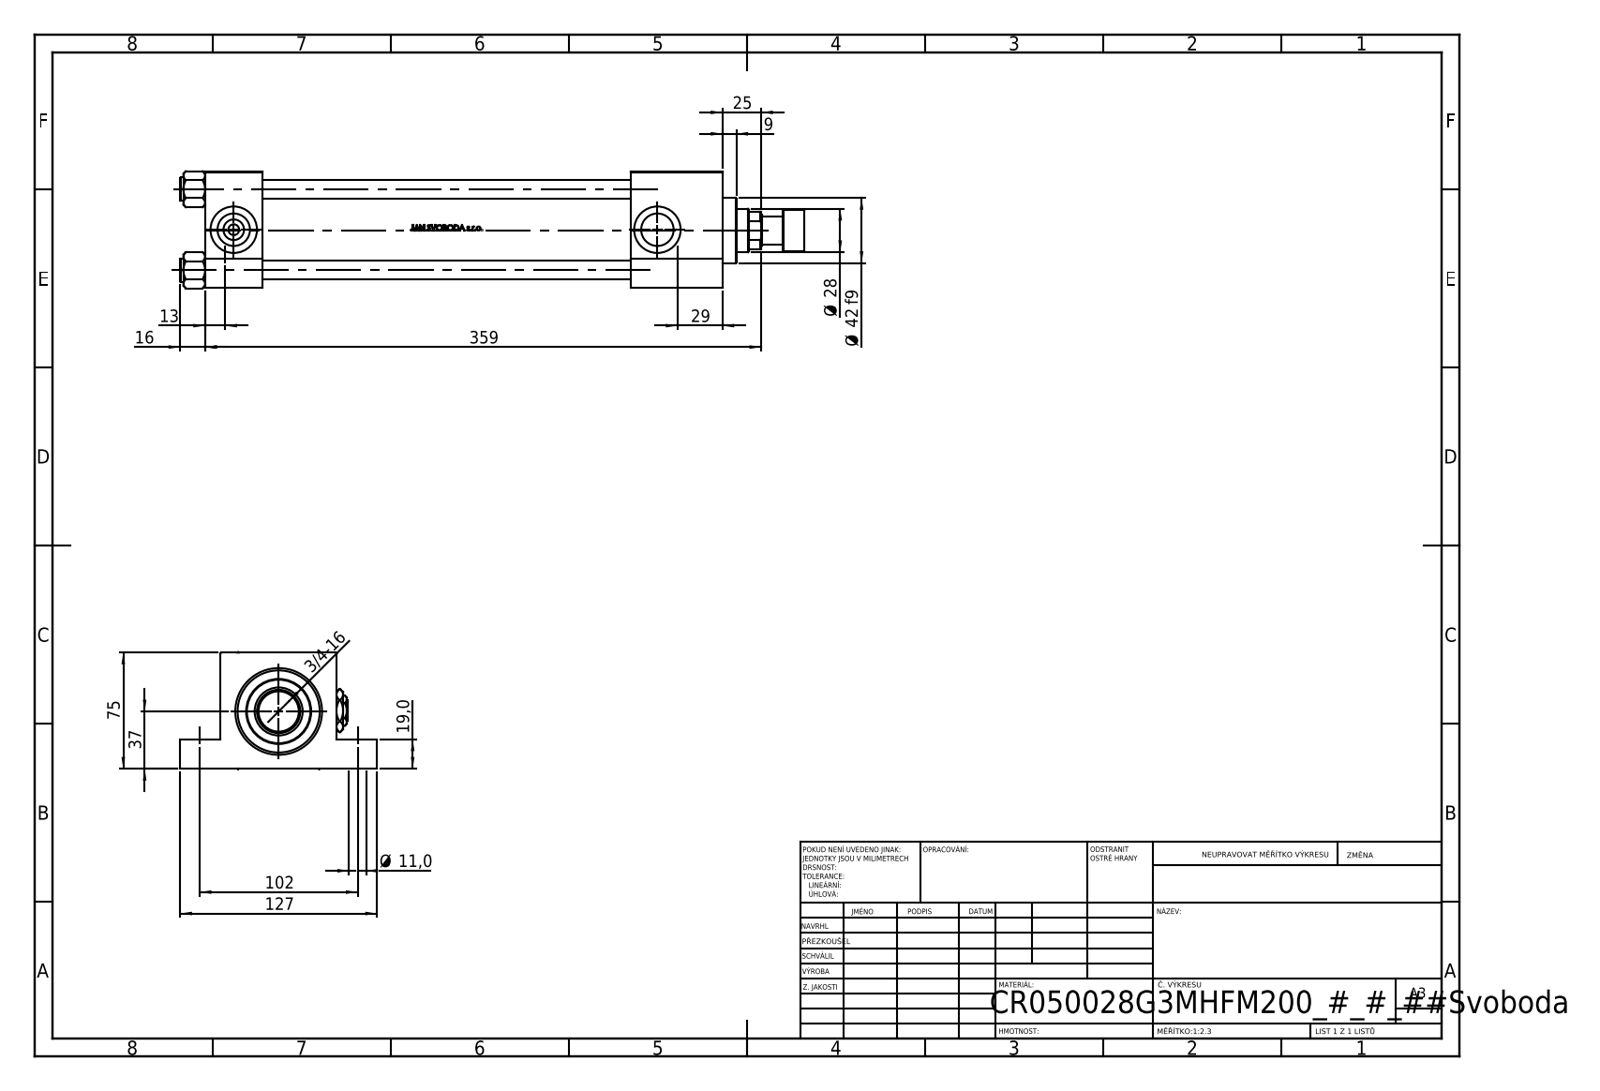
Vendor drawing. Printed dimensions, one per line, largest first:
359
127
102
75
Ø 42 f9
37
29
Ø 28
25
19,0
16
13
Ø 11,0
9
3/4-16
